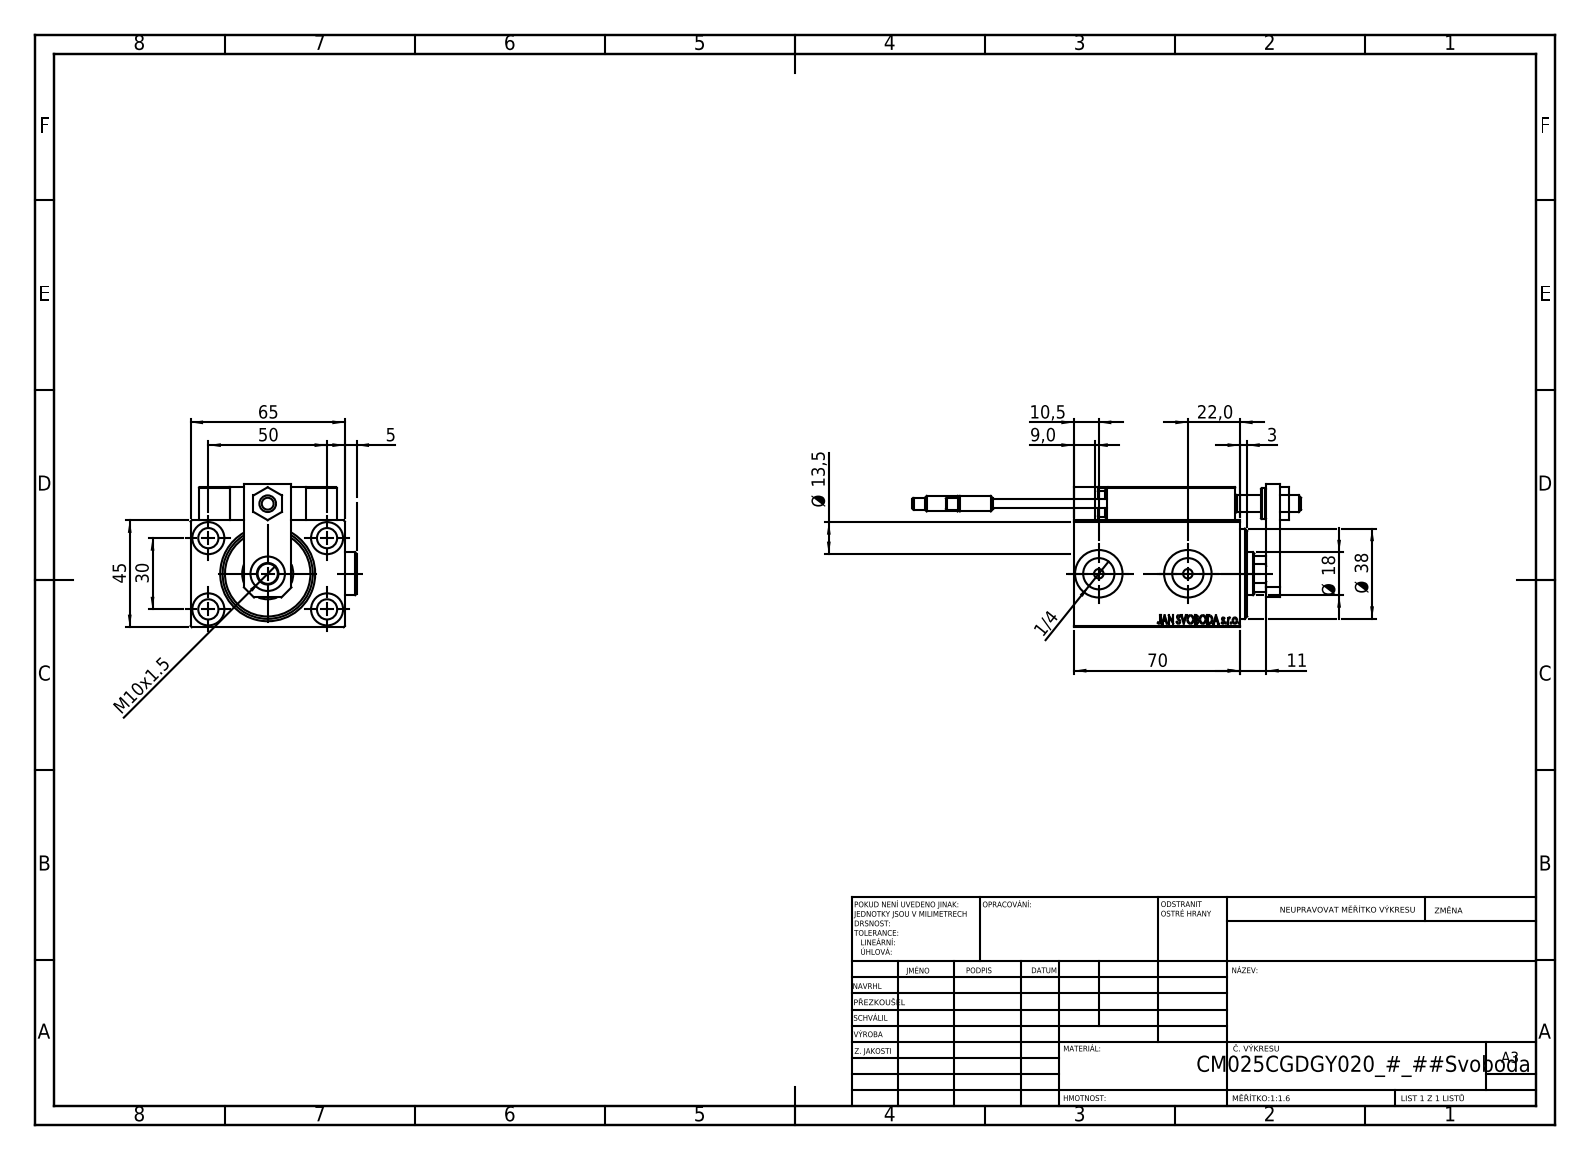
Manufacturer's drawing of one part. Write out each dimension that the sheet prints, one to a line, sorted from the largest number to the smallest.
70
65
50
45
Ø 38
30
22,0
Ø 18
Ø 13,5
11
10,5
M10x1.5
9,0
5
3
1/4
